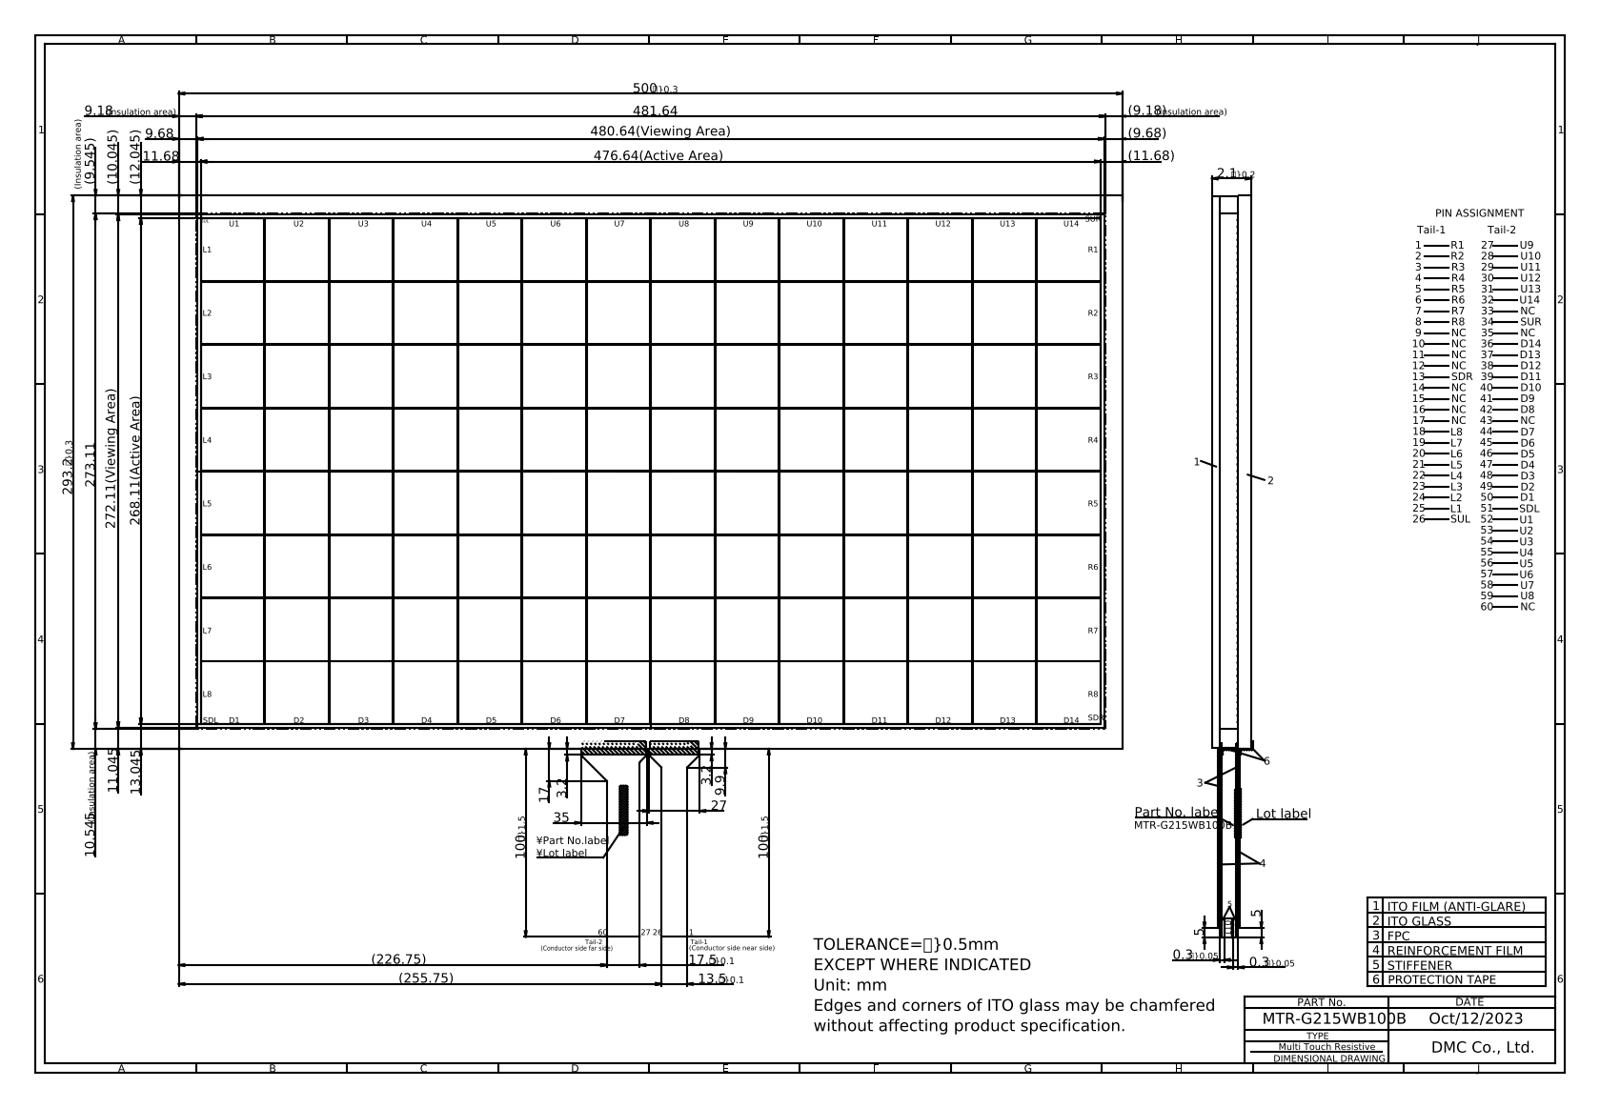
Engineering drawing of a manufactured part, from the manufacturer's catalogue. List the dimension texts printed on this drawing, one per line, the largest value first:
500.000
481.64
480.64(Viewing Area)
476.64(Active Area)
293.200
273.11
272.11(Viewing Area)
268.11(Active Area)
(255.75)
(226.75)
99.60
99.60
35
27
17.500
17
13.500
13.045
(12.045)
11.68
(11.68)
11.045
10.545{\H0.6667x;(Insulation area)}
(10.045)
(10)
9.9
9.68
(9.68)
(9.545)
(9.180){\H0.6667x;(Insulation area)}
9.180{\H0.6667x;(Insulation area)}
5
5
3.2
3.2
2.1{\H0.6667x;?}0.2}
0.3{\H0.6667x;?}0.05}
0.3{\H0.6667x;?}0.05}
